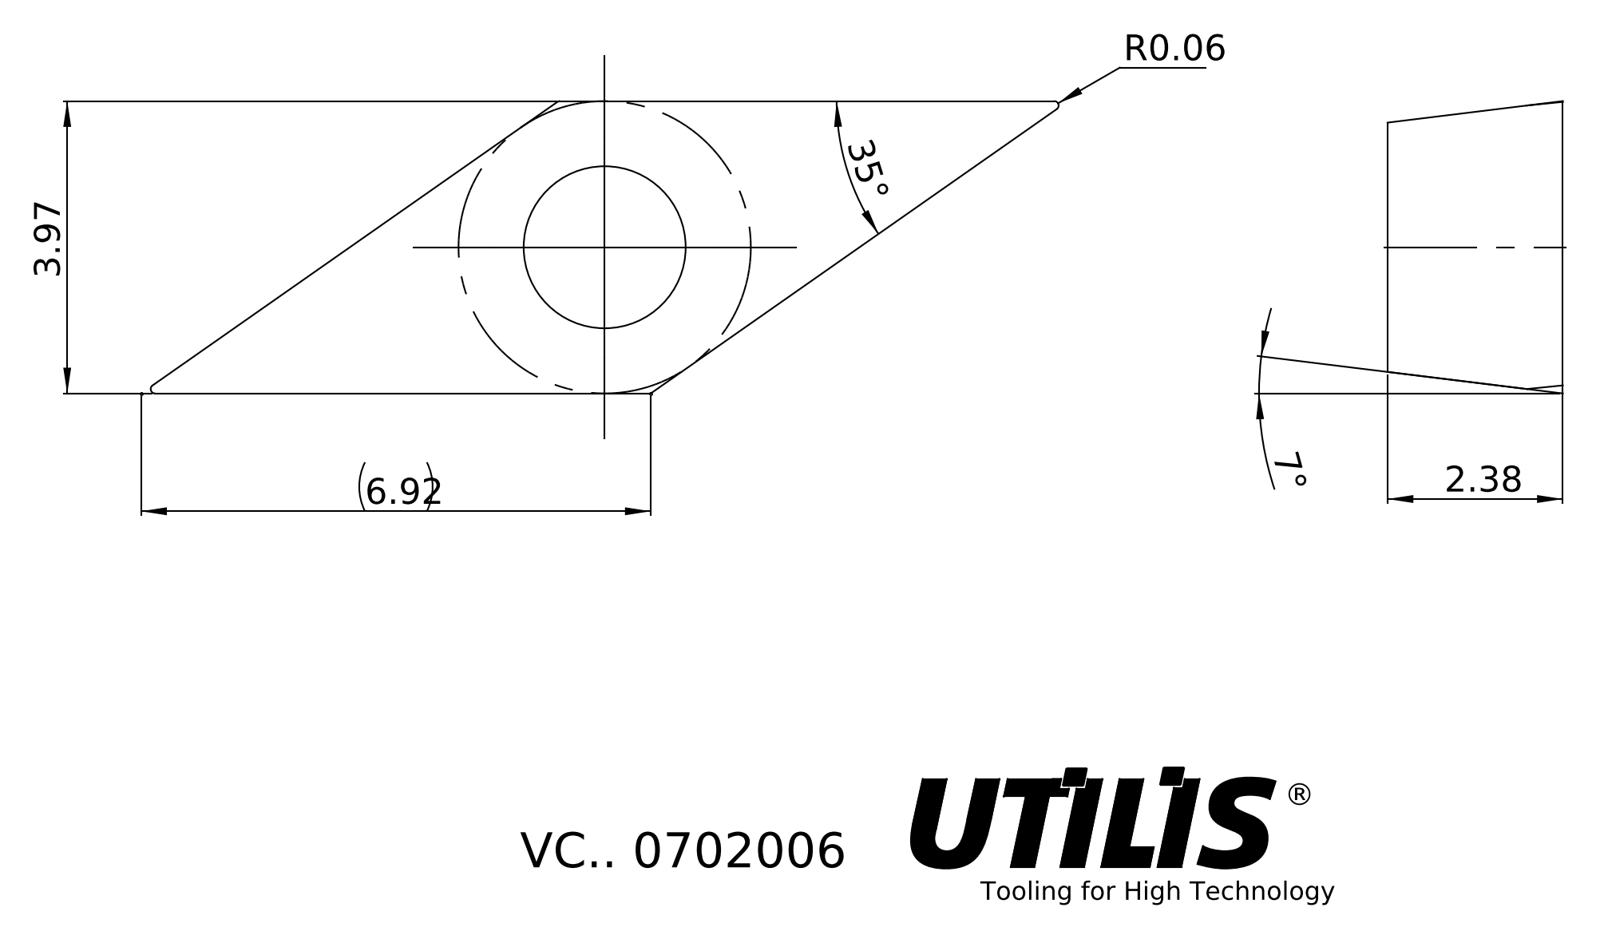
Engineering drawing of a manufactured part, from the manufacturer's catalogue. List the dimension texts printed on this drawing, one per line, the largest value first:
35°
6.92
3.97
2.38
R0.06
